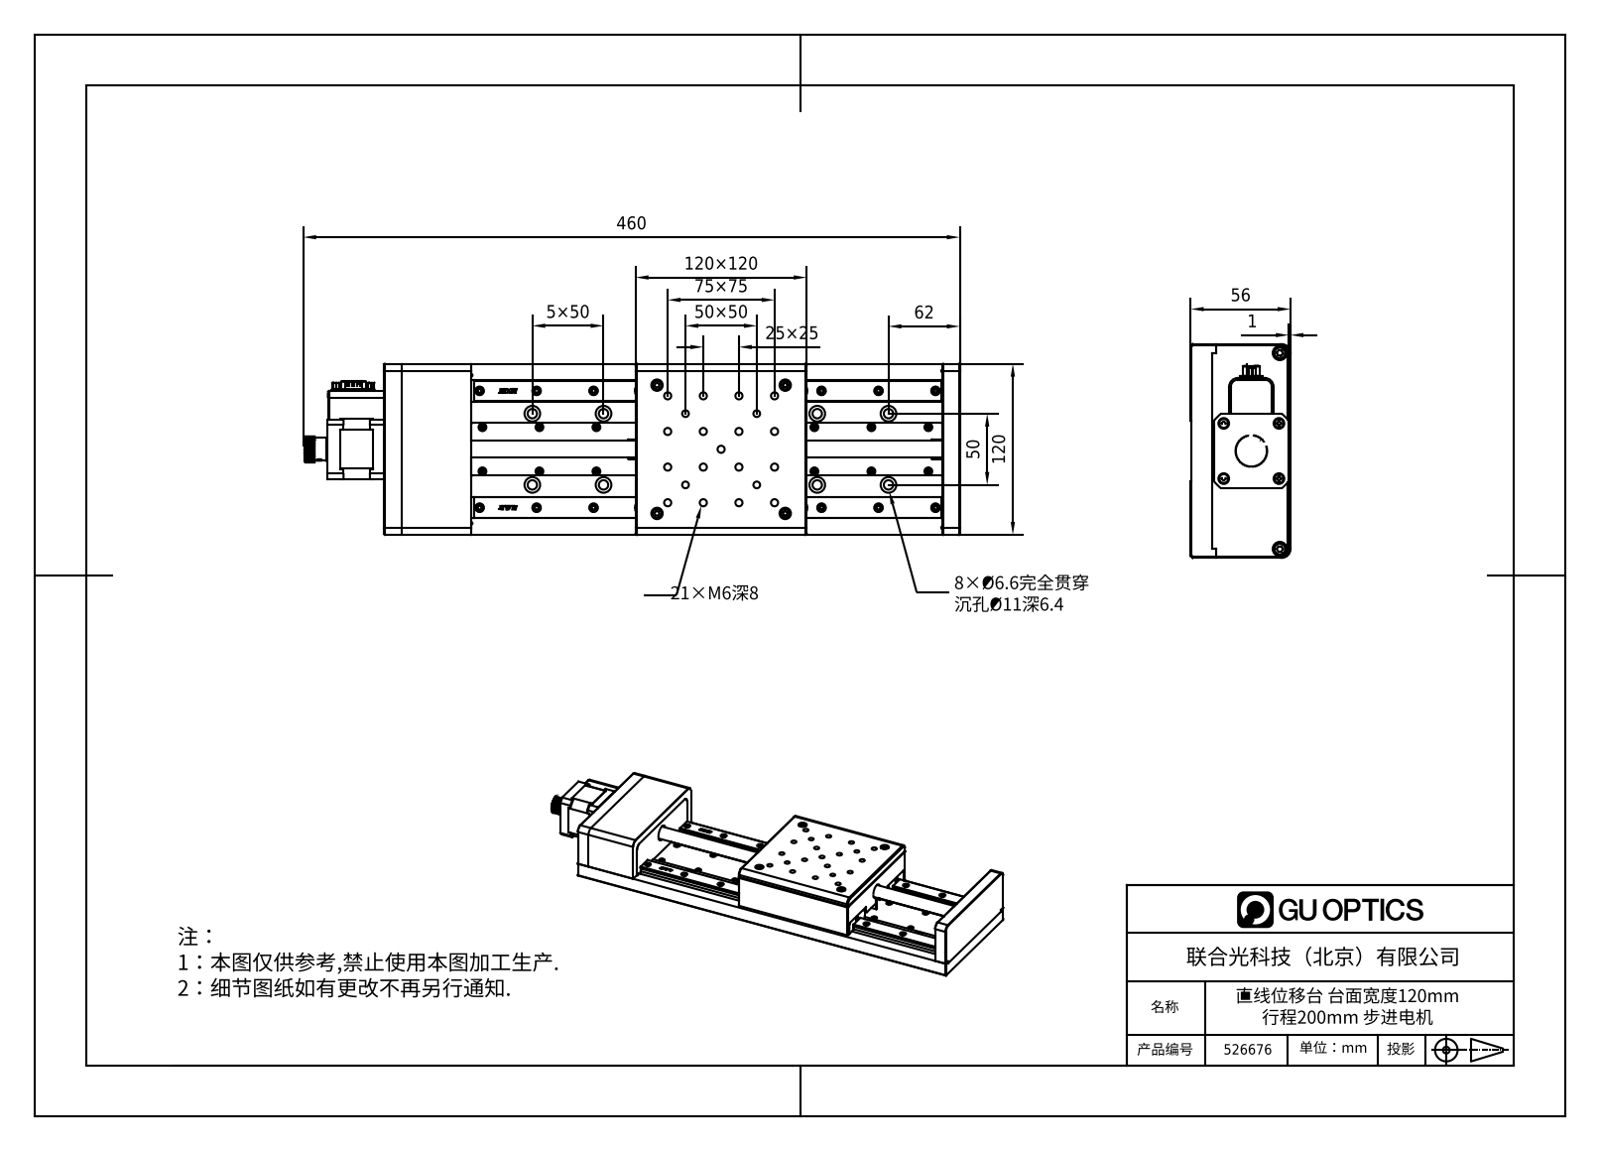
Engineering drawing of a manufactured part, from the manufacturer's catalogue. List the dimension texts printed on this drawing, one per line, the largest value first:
460
120×120
120
75×75
62
56
50×50
50
5×50
25×25
1
